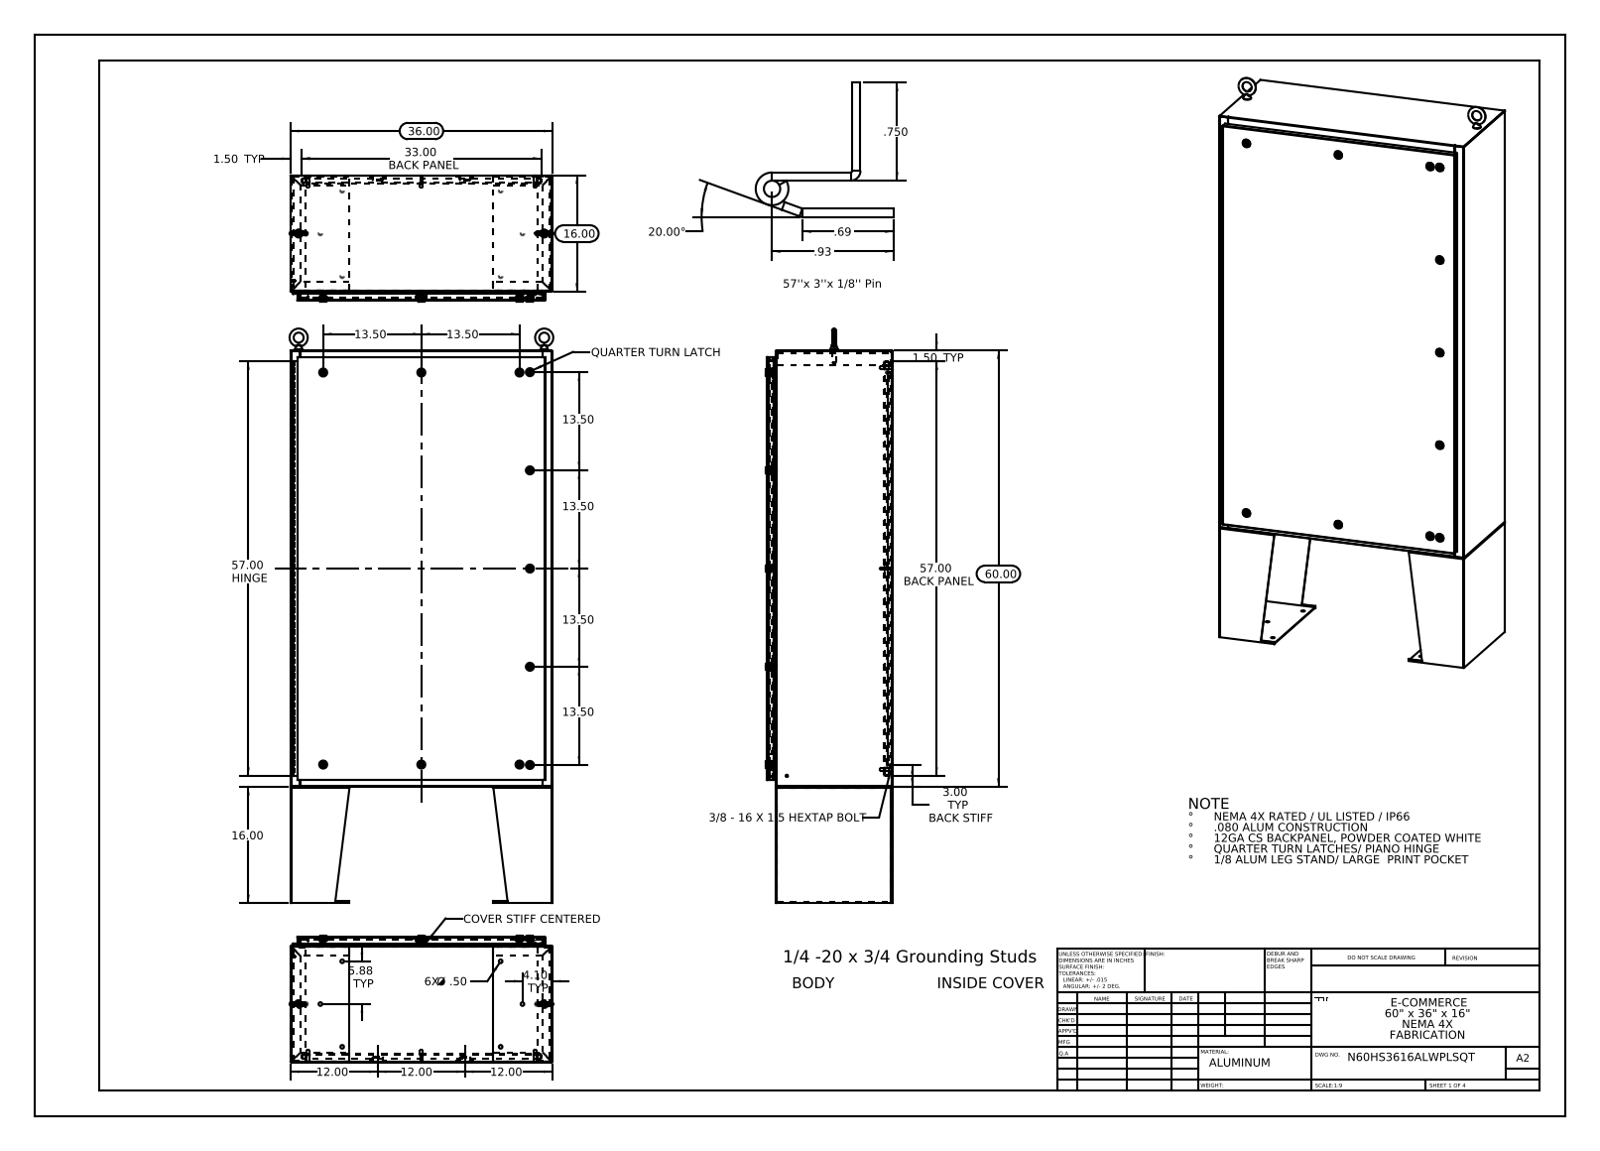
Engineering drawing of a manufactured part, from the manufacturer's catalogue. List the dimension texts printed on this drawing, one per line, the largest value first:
60.00
57.00 HINGE
57.00 BACK PANEL
36.00
33.00 BACK PANEL
20.00°
16.00
16.00
13.50
13.50
13.50
13.50
13.50
13.50
12.00
12.00
12.00
5.88 TYP
4.10 TYP
3.00 TYP BACK STIFF
1.50 TYP
1.50 TYP
.93
.750
.69
6X Ø .50
